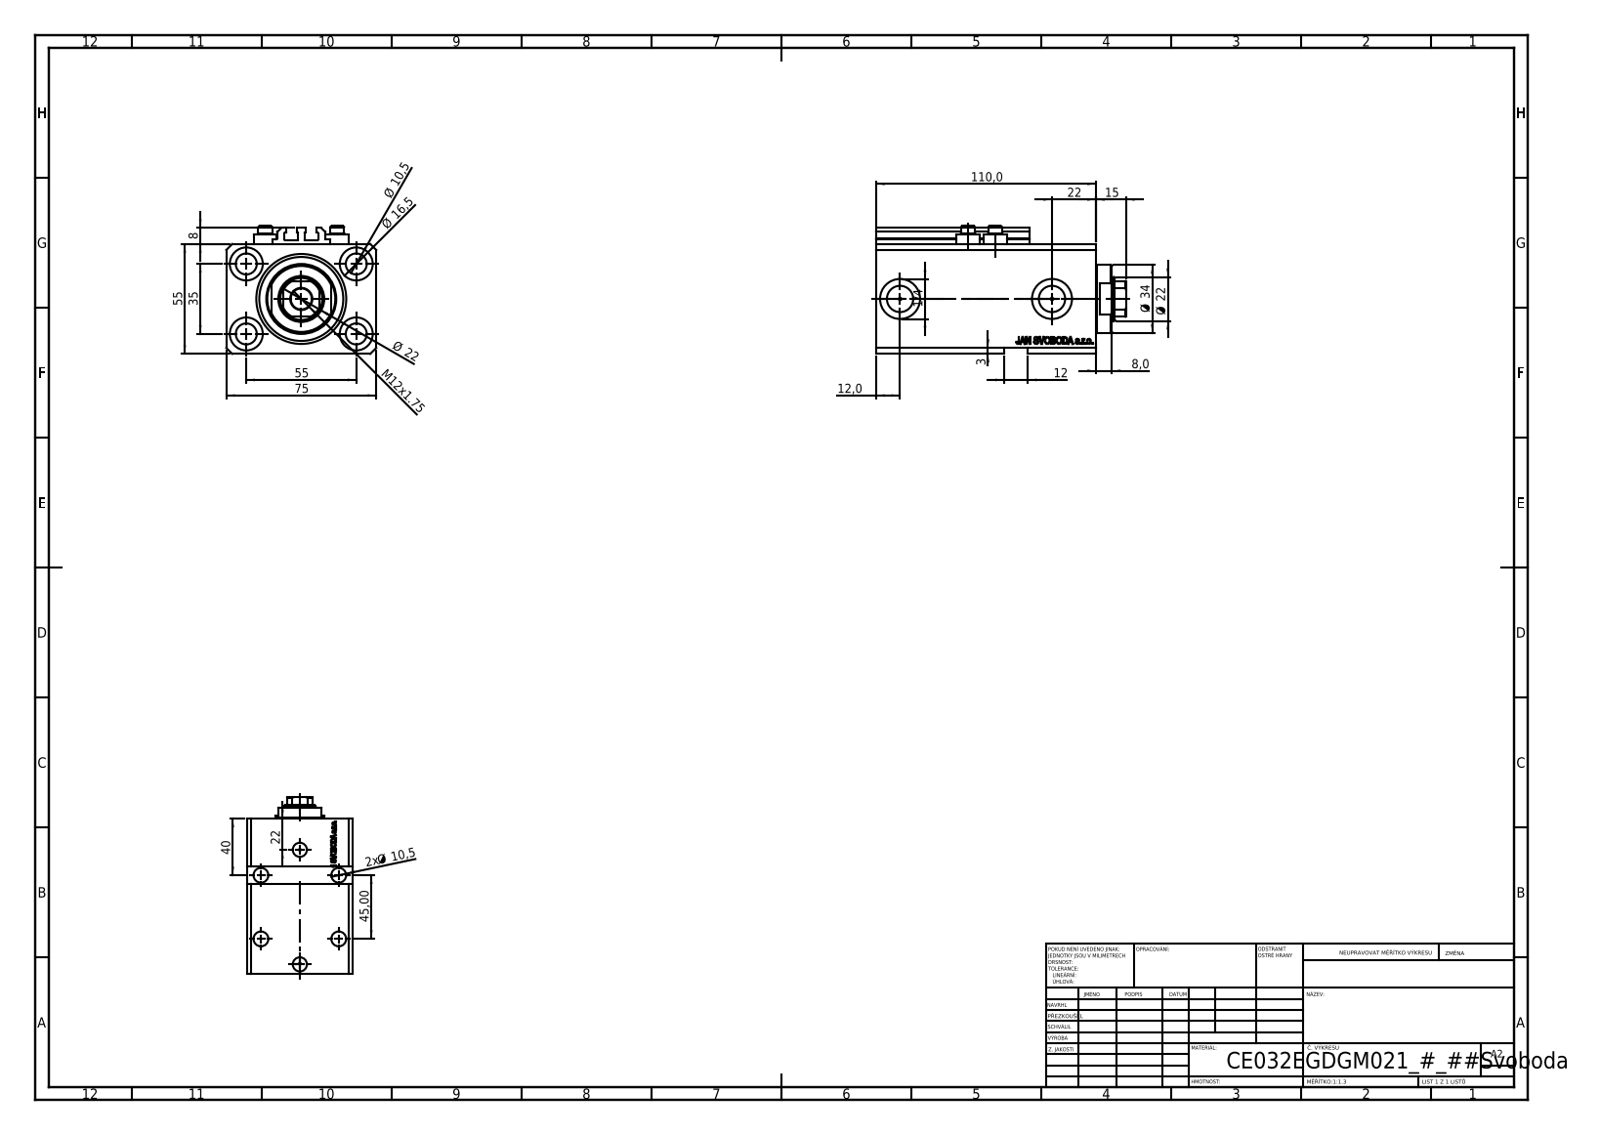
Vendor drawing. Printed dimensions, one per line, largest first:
110,0
75
55
55
45,00
40
35
Ø 34
Ø 22
22
Ø 22
22
Ø 16,5
15
M12x1.75
12,0
12
Ø 10,5
2x Ø 10,5
8
8,0
3
1/4
